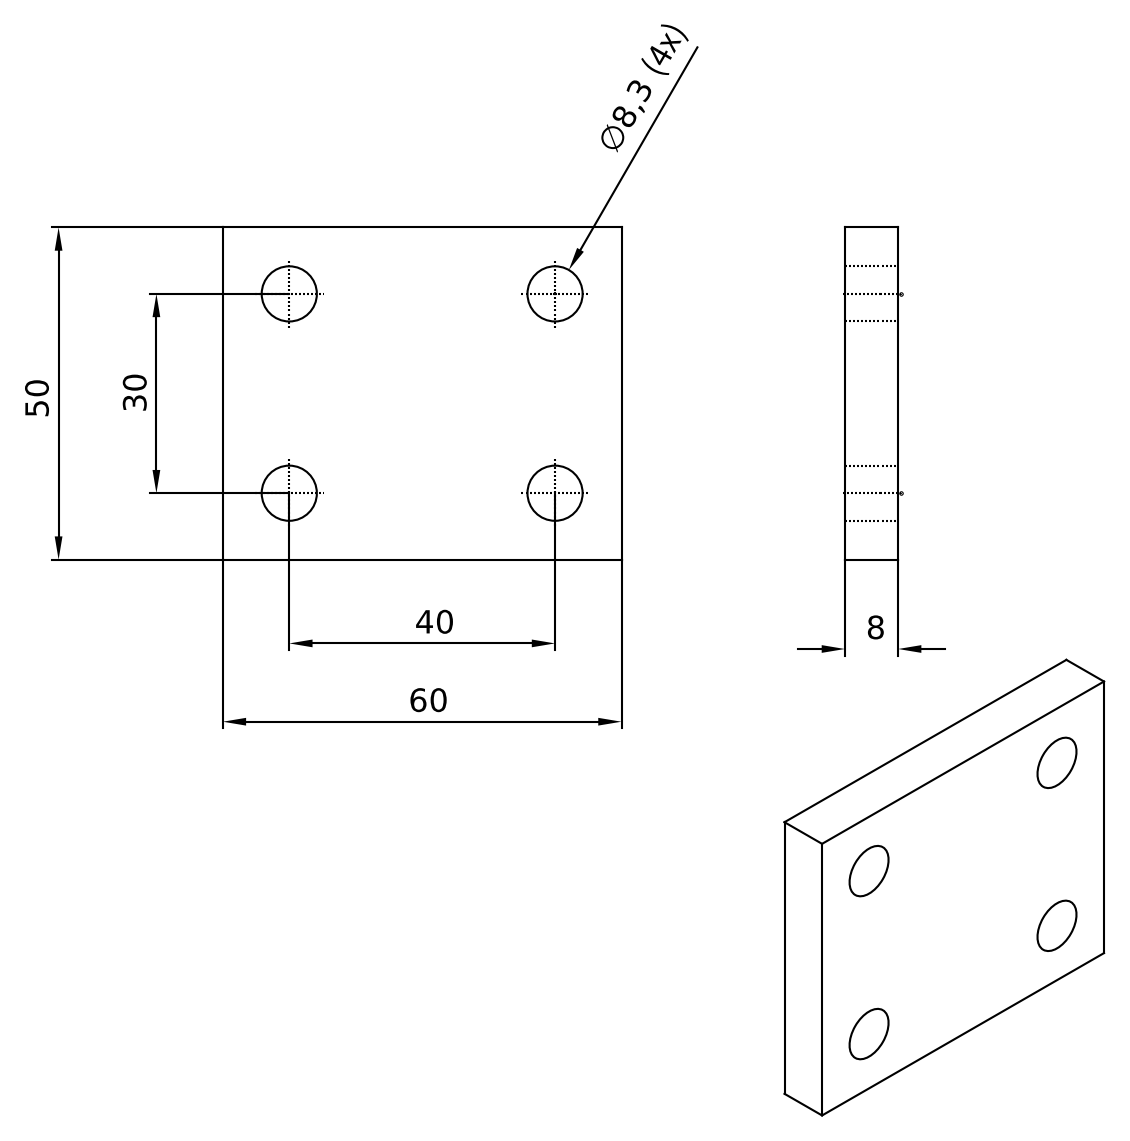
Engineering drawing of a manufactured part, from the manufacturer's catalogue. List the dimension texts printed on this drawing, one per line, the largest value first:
60
50
40
30
8
(4x)
